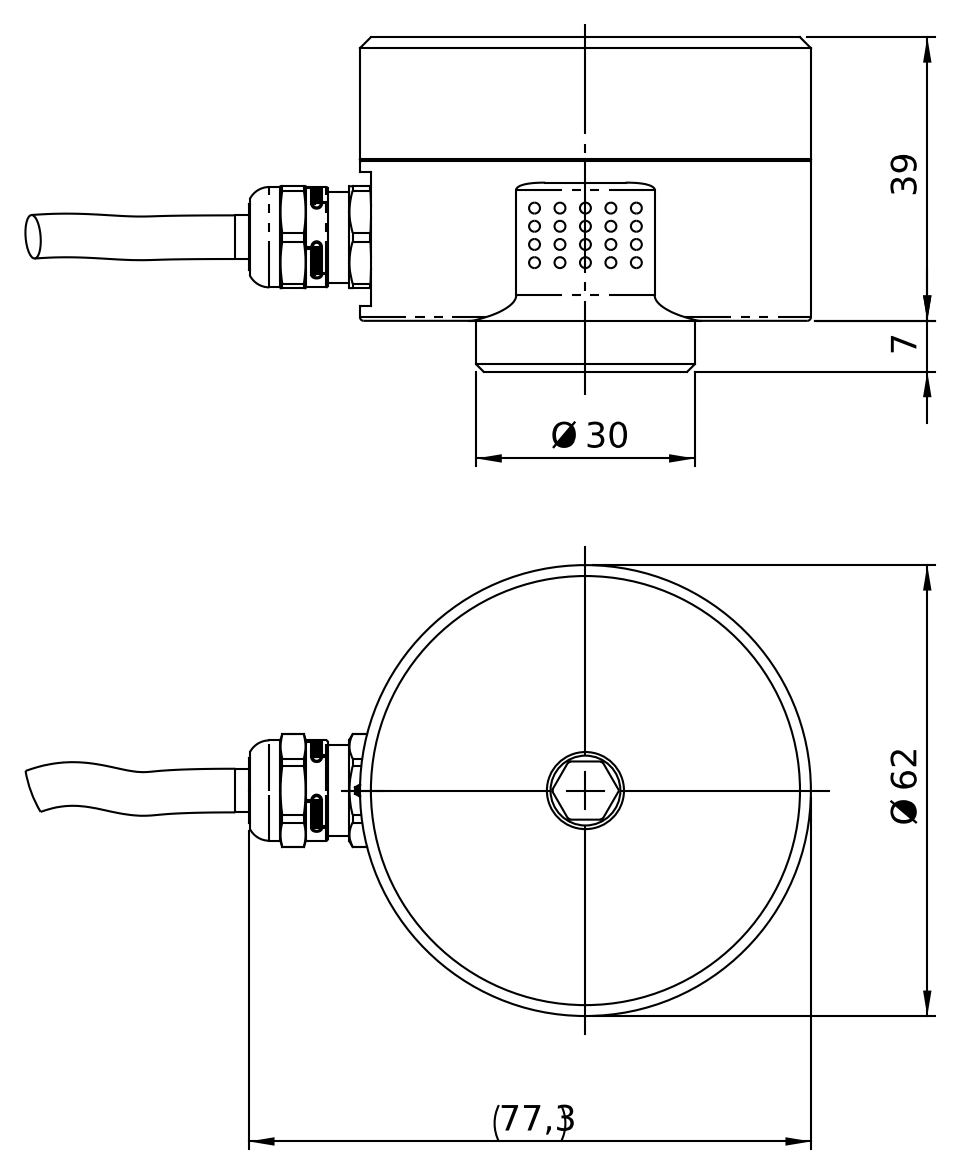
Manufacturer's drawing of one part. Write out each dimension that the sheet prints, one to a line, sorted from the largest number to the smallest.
77,3
Ø 62
39
Ø 30
7
